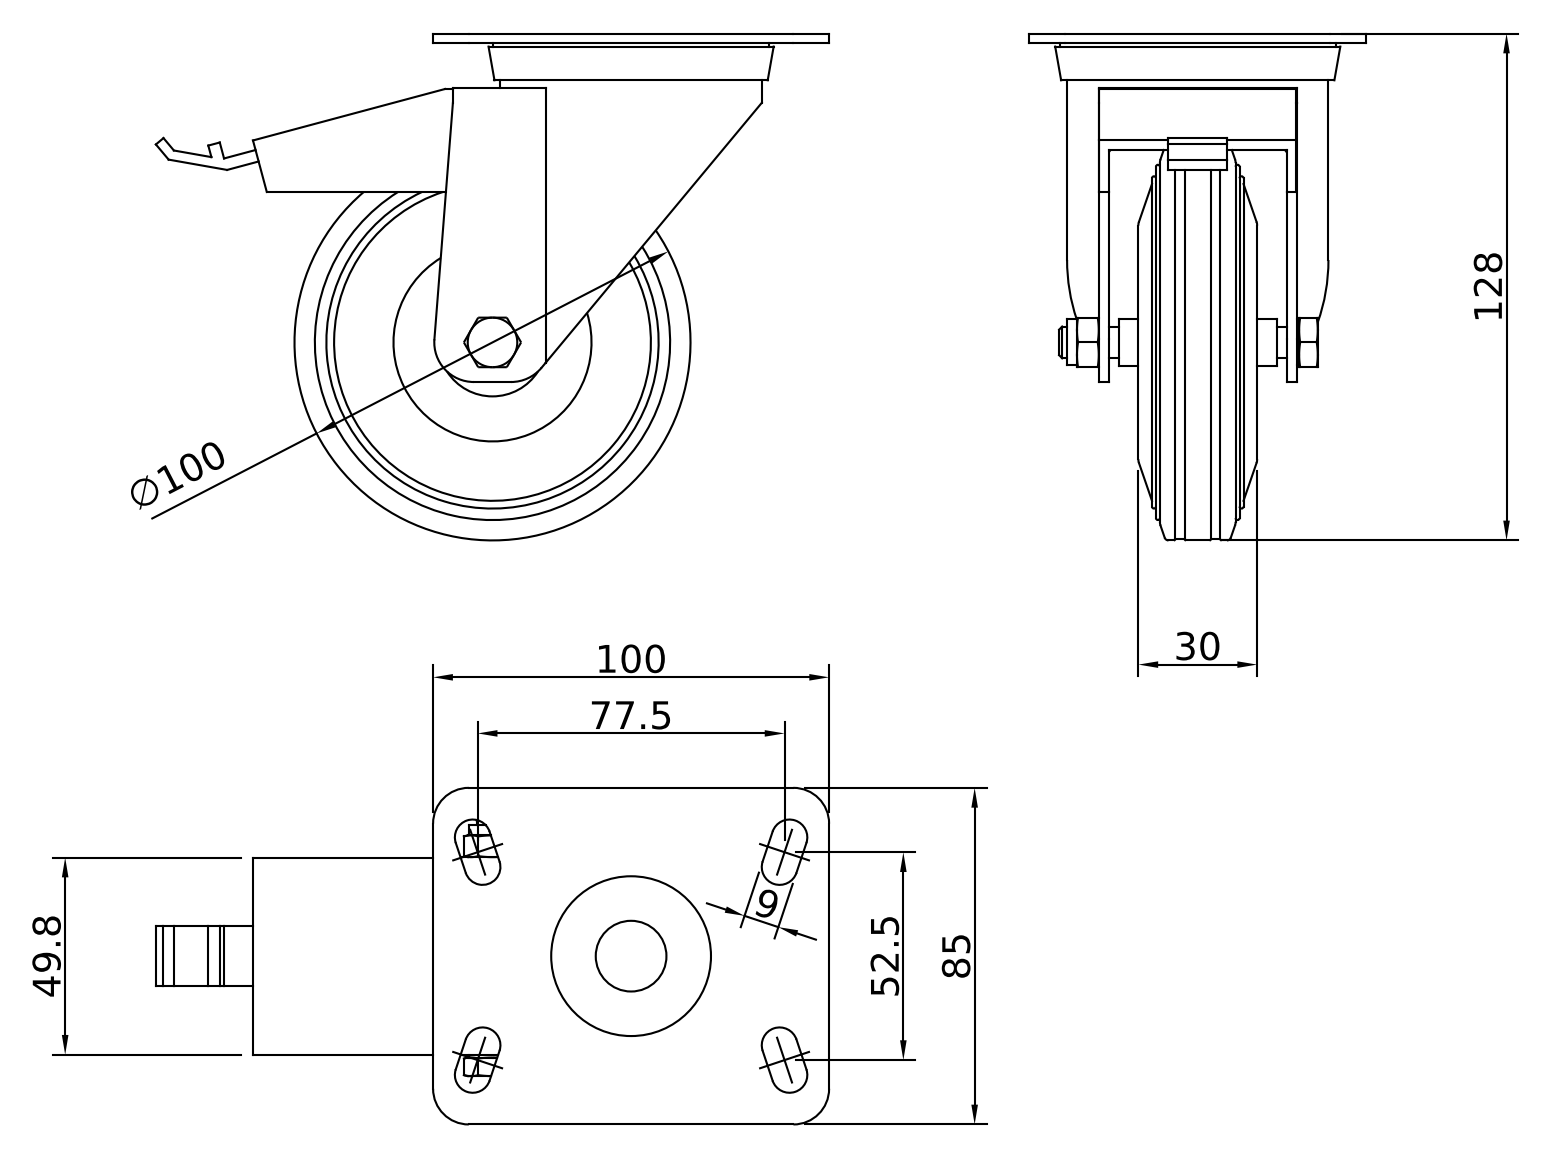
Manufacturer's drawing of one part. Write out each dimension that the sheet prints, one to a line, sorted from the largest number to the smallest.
128
∅100
100
85
77.5
52.5
49.8
30
9
